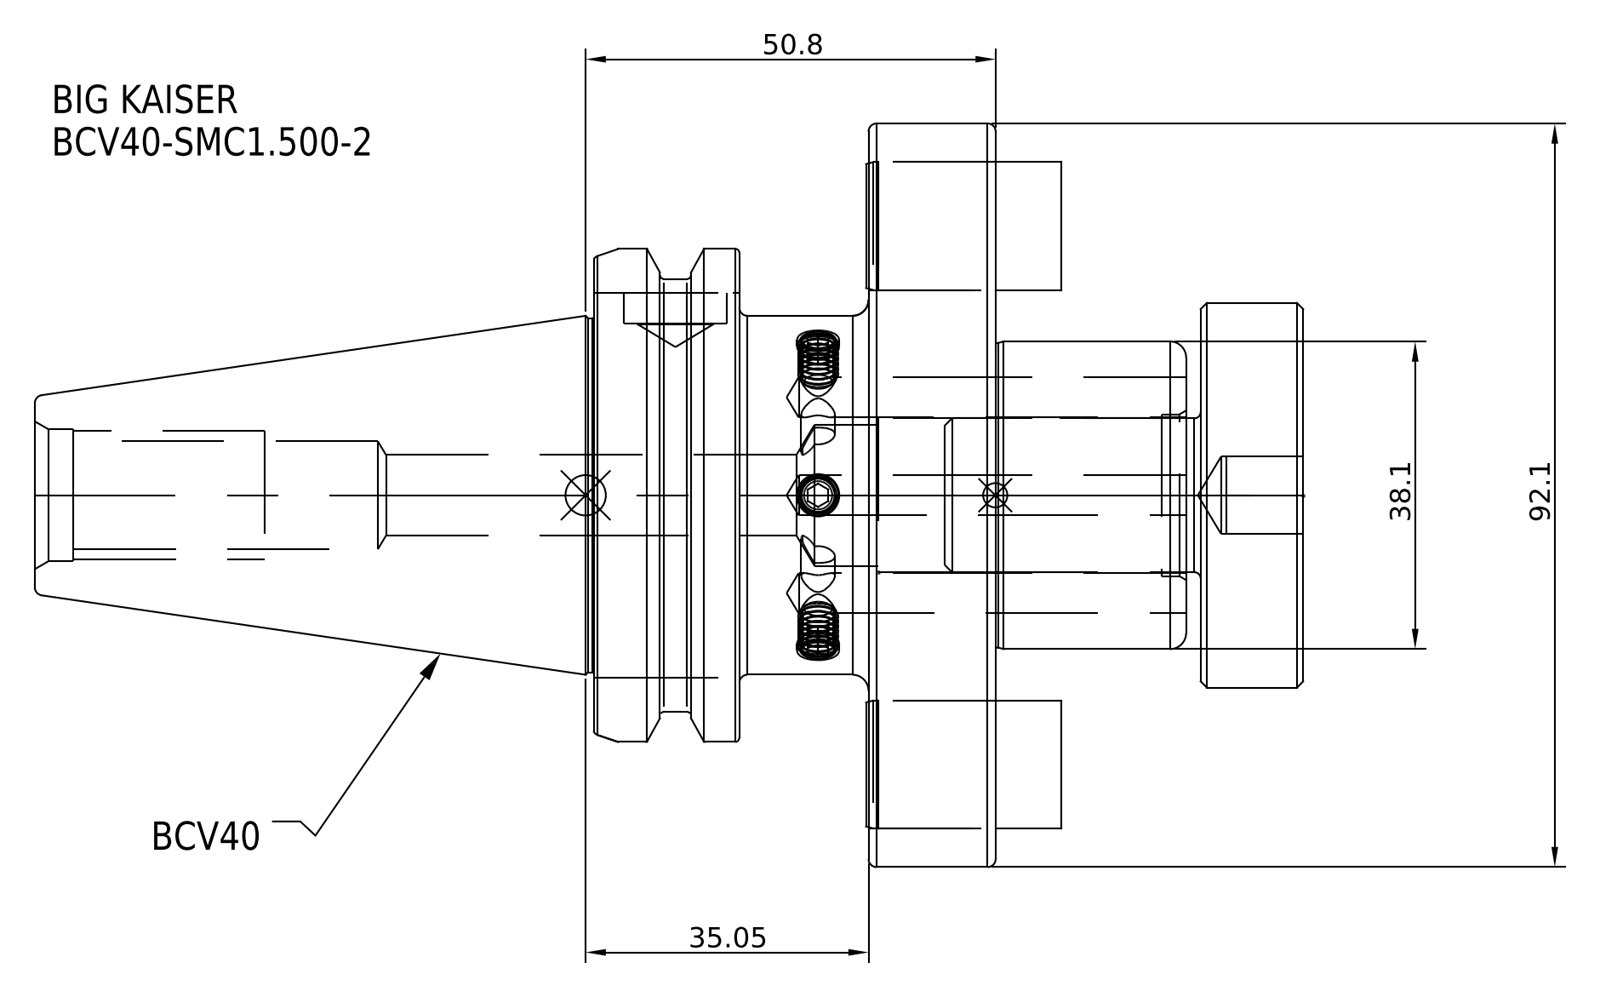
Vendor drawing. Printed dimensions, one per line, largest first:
92.1
50.8
38.1
35.05
